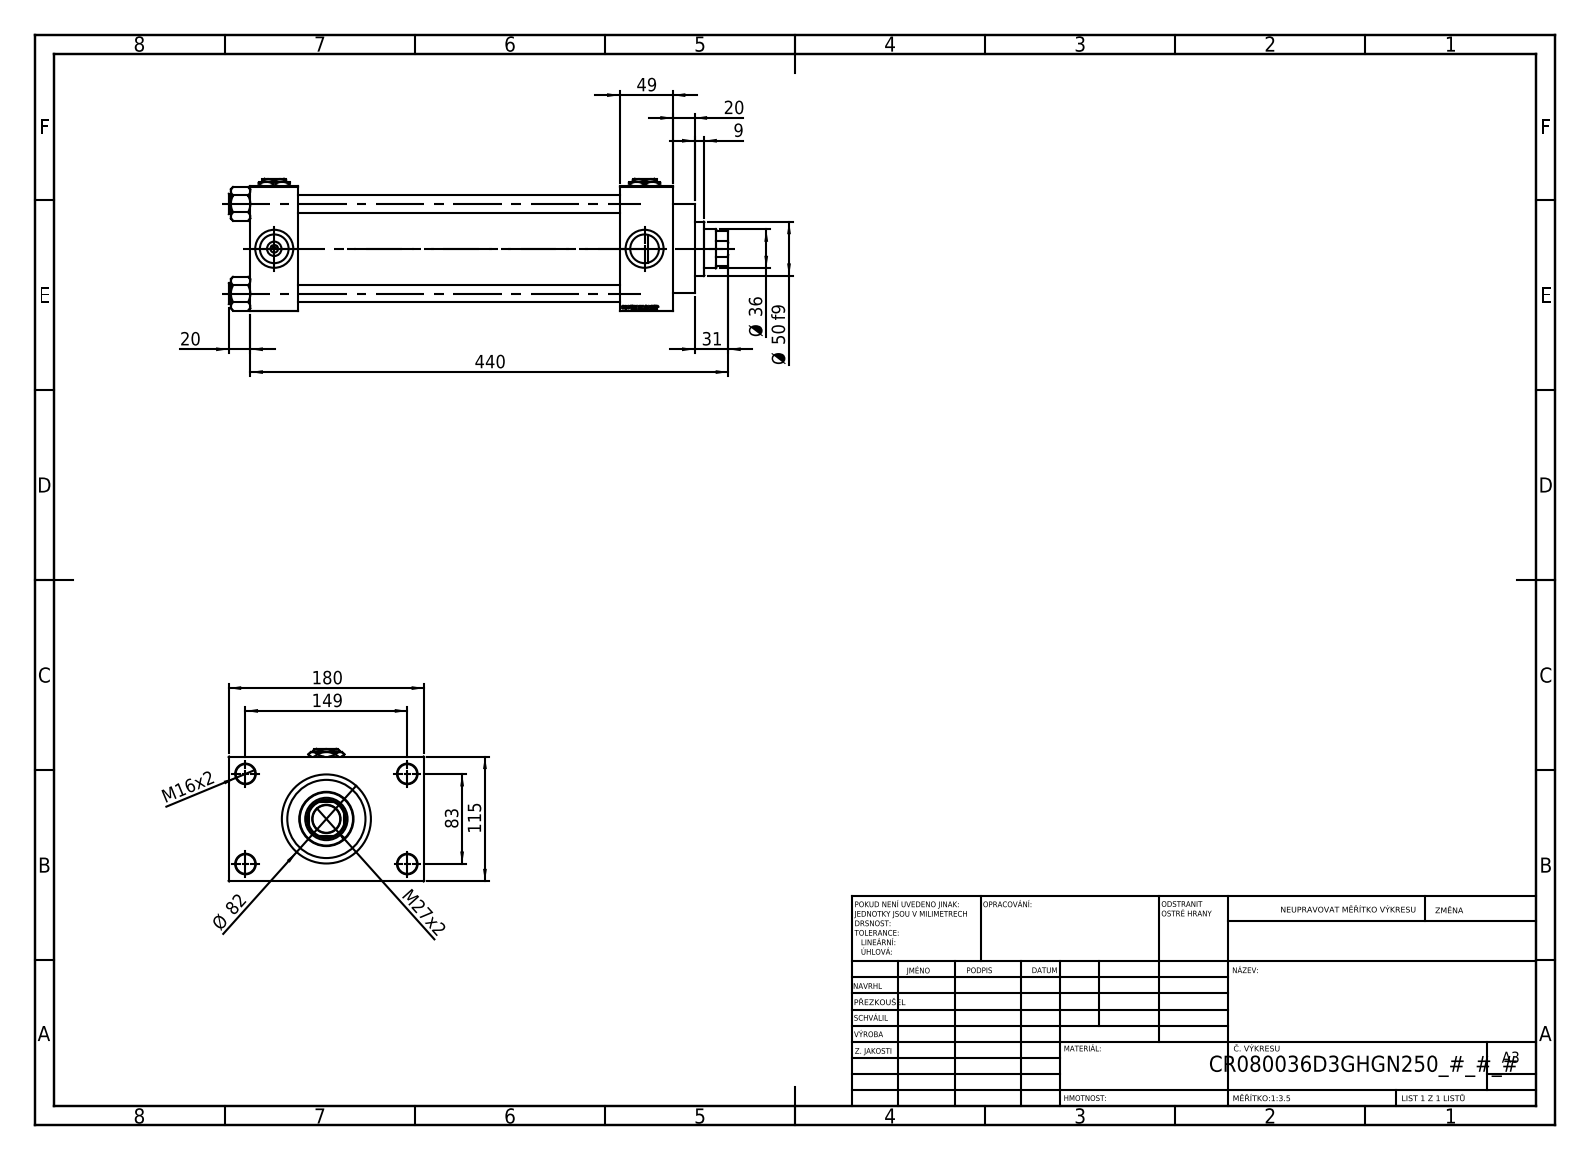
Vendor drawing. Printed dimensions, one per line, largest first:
440
180
149
115
83
Ø 82
Ø 50 f9
49
Ø 36
31
M27x2
20
20
M16x2
9
